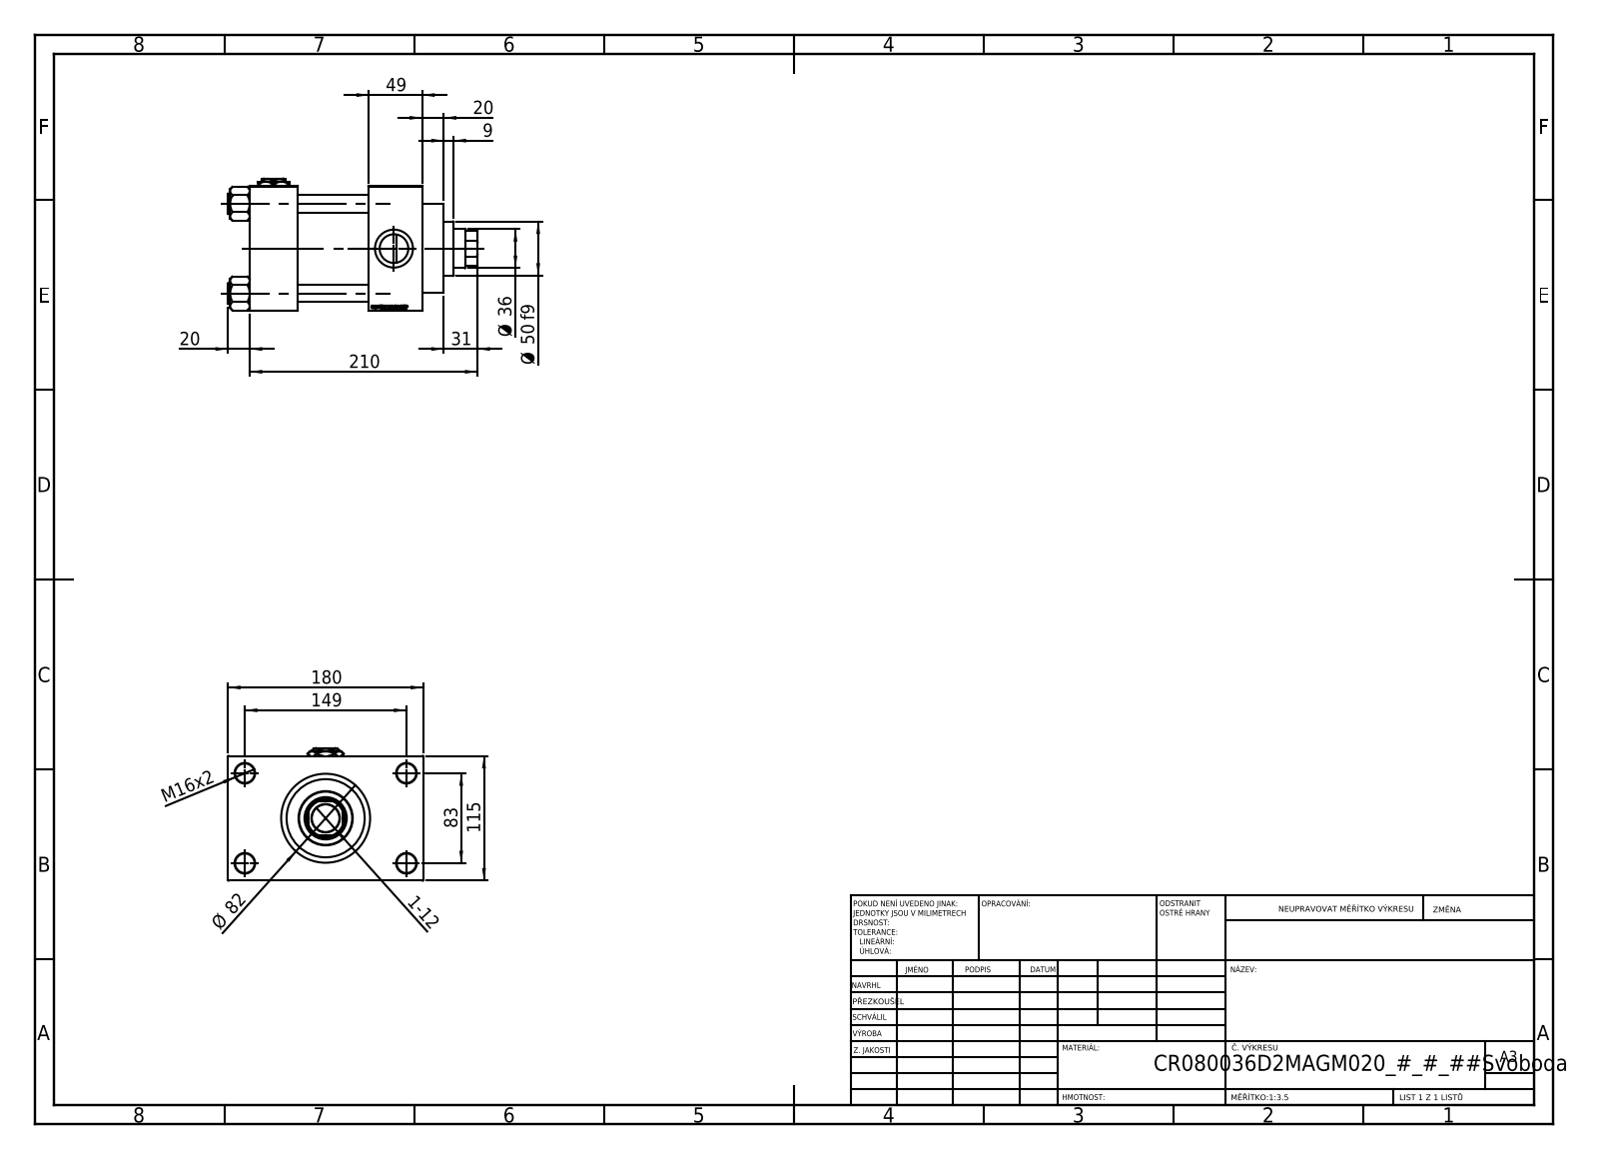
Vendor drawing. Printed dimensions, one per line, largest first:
210
180
149
115
83
Ø 82
Ø 50 f9
49
Ø 36
31
20
20
M16x2
9
1-12
